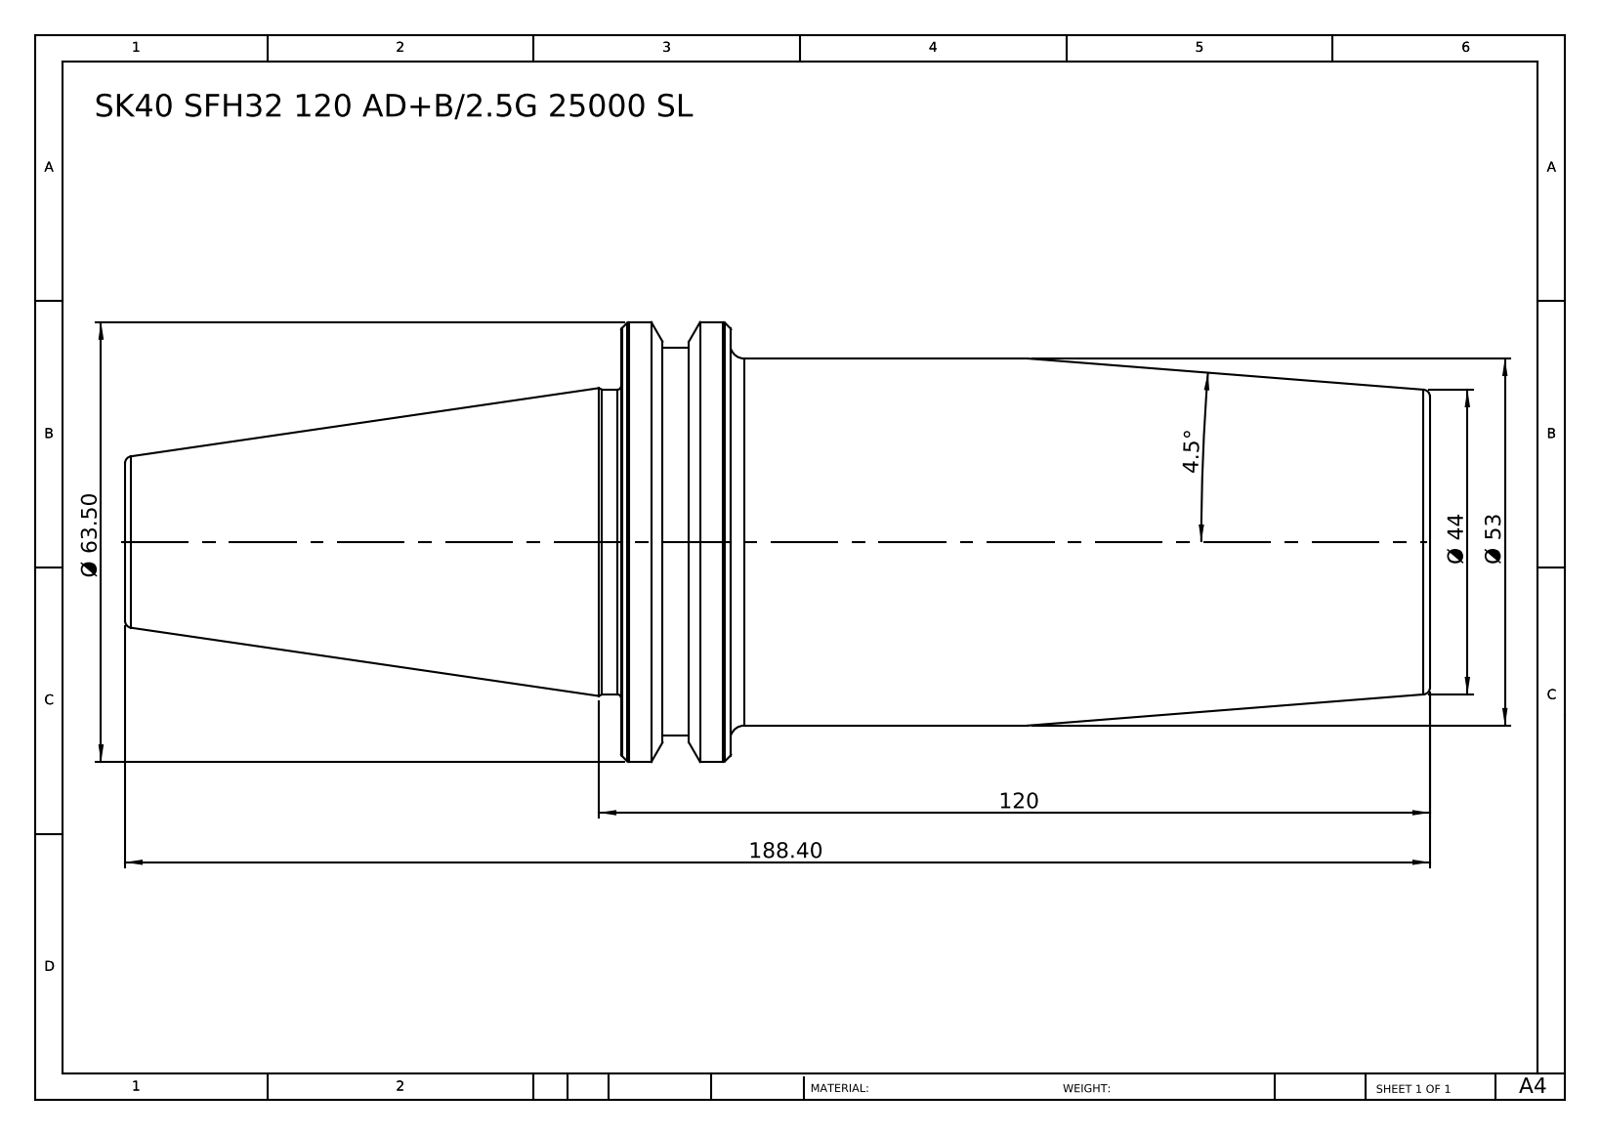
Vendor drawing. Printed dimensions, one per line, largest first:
188.40
120
Ø 63.50
Ø 53
Ø 44
4.5°
